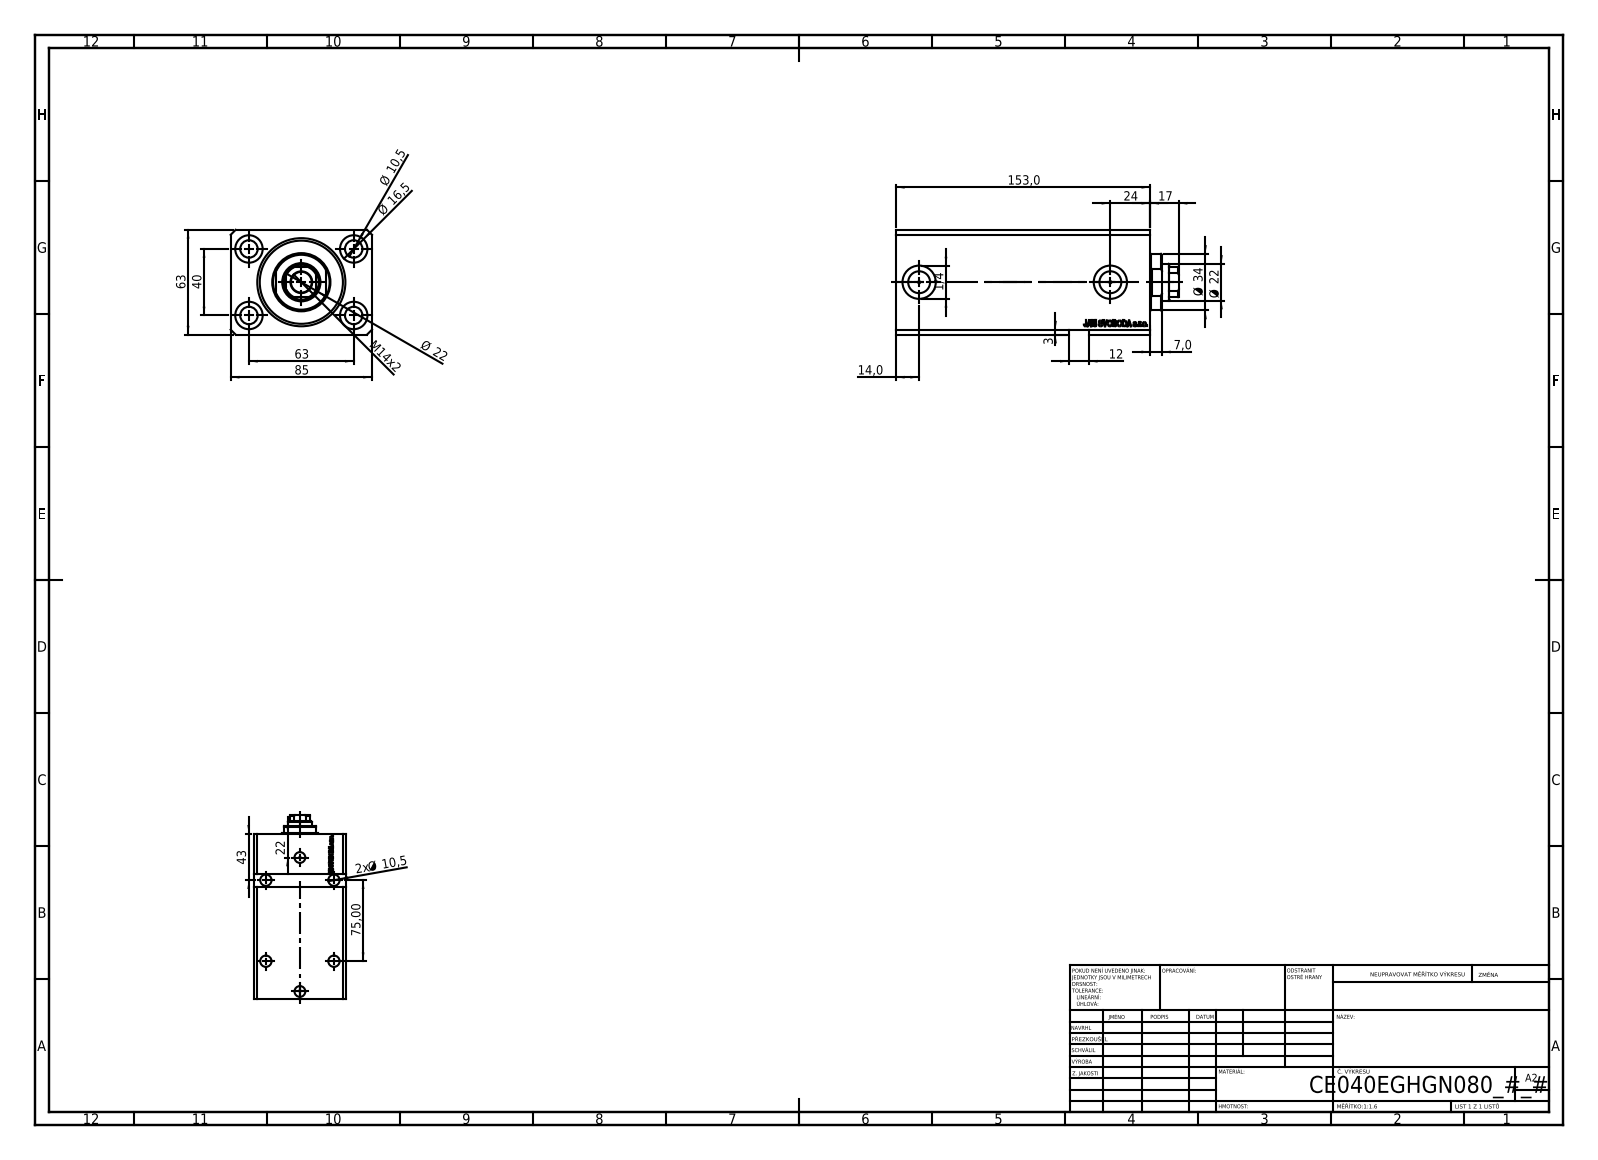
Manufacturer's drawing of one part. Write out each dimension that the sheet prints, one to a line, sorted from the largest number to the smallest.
153,0
85
75,00
63
63
43
40
Ø 34
24
Ø 22
Ø 22
22
17
Ø 16,5
M14x2
14,0
12
Ø 10,5
2x Ø 10,5
7,0
3
1/4
